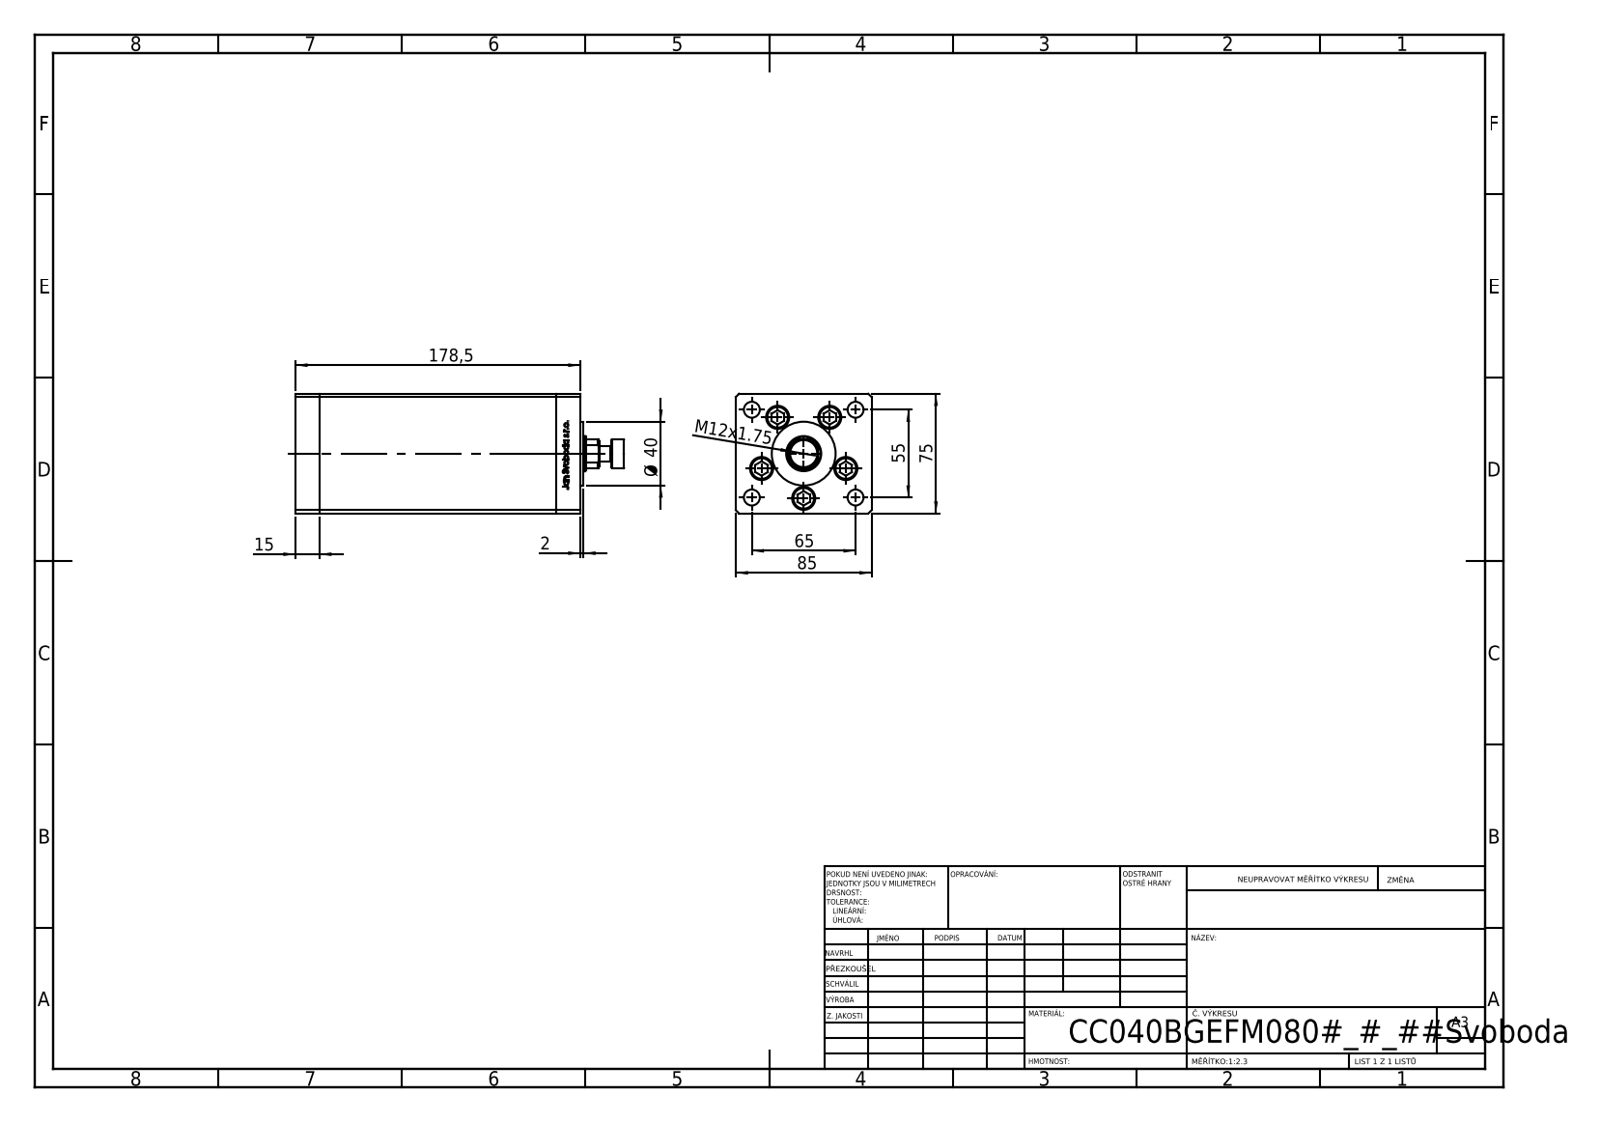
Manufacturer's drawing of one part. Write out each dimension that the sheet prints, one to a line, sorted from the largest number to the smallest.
178,5
85
75
65
55
Ø 40
15
M12x1.75
2
